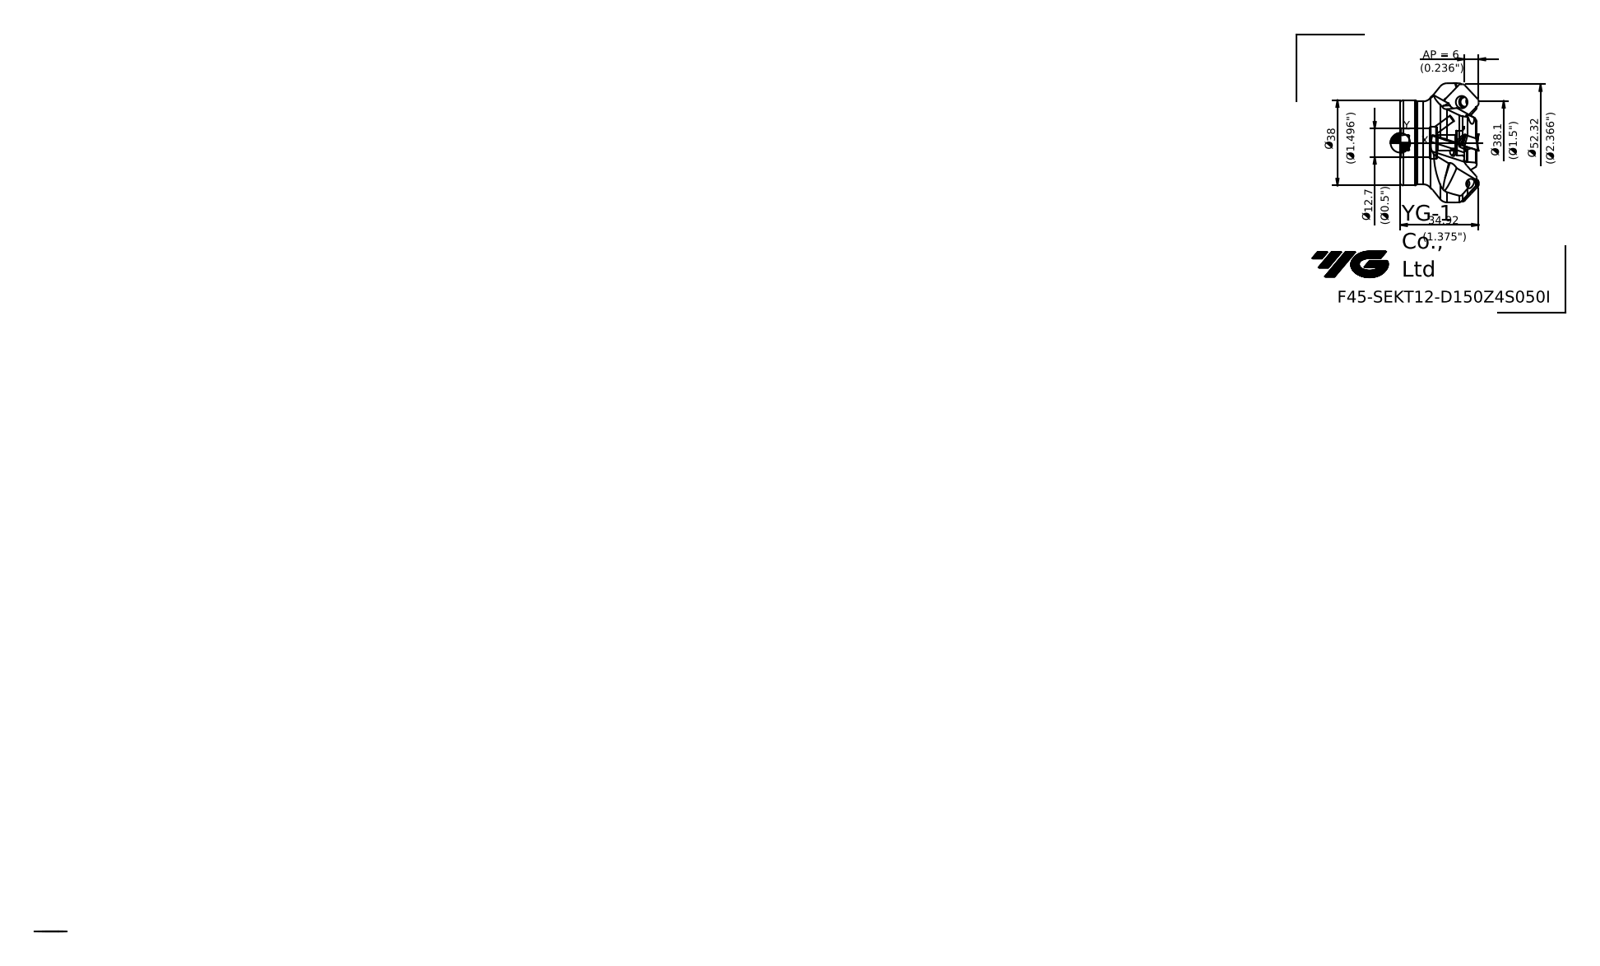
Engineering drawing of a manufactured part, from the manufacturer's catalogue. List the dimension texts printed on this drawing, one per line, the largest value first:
52.32 Ø
38.1 Ø
Ø 38
34.92
Ø 12.7
AP = 6
